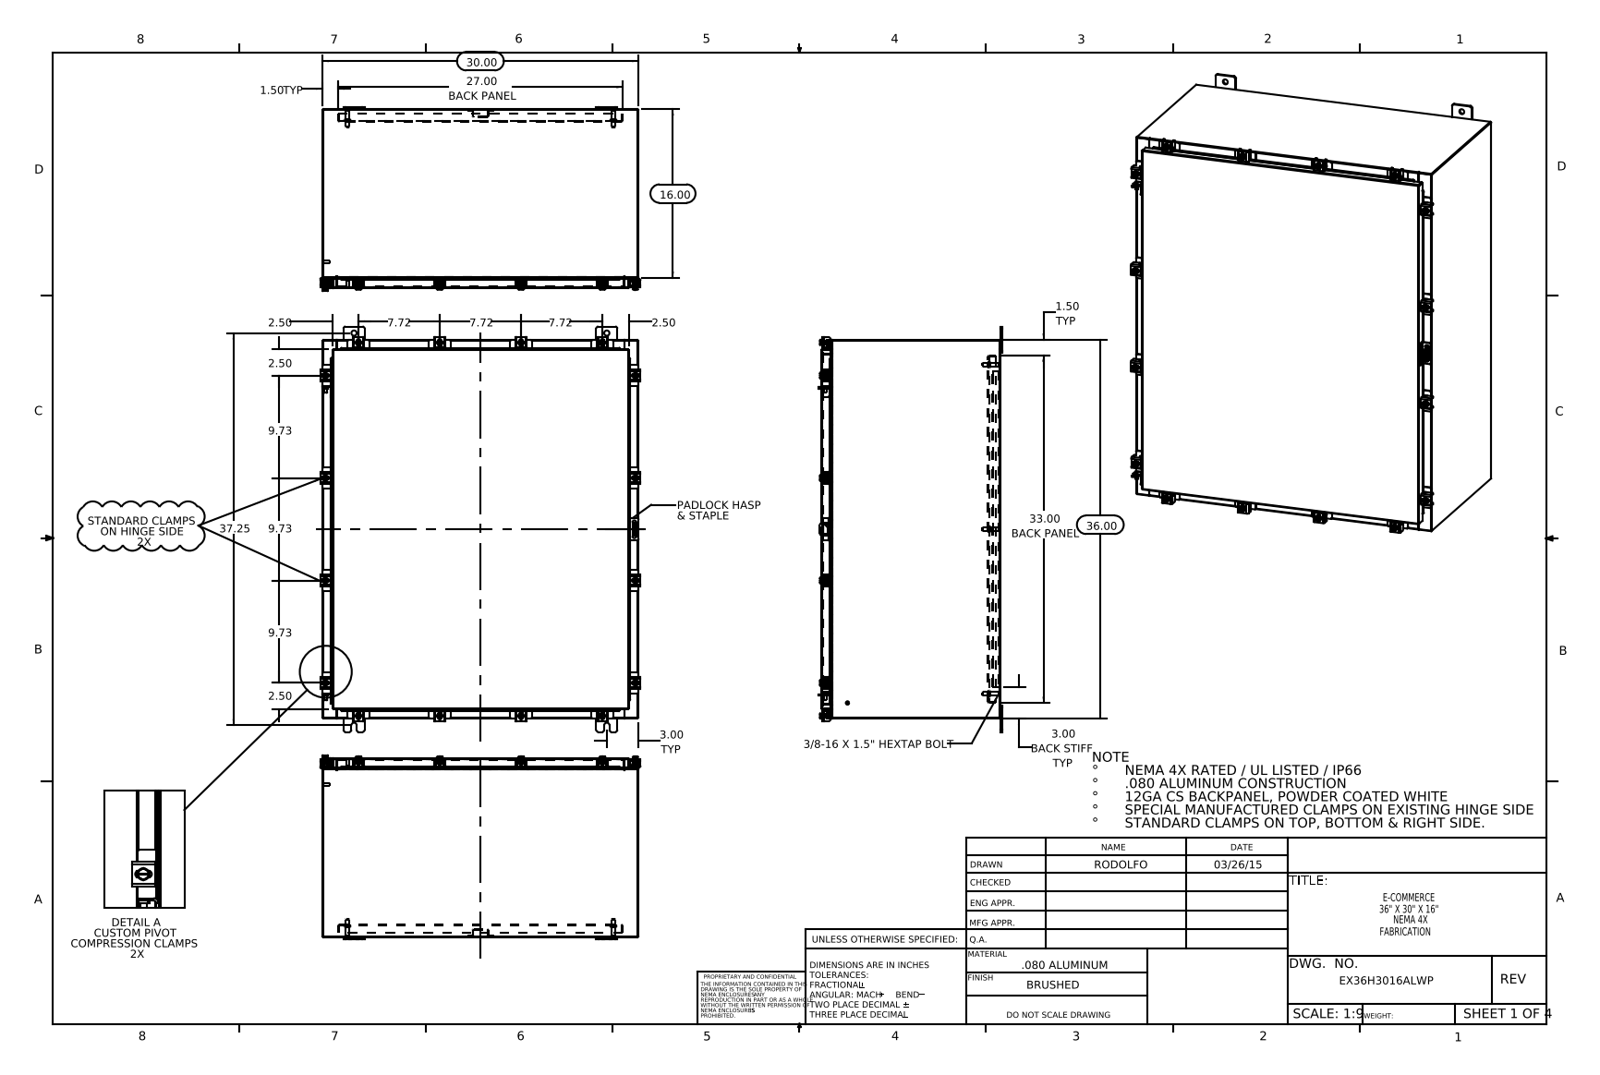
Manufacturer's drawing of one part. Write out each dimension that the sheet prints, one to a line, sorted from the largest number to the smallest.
37.25
36.00
33.00 BACK PANEL
30.00
27.00 BACK PANEL
16.00
9.73
9.73
9.73
7.72
7.72
7.72
3.00 TYP
3.00 BACK STIFF TYP
2.50
2.50
2.50
2.50
1.50 TYP
1.50 TYP
